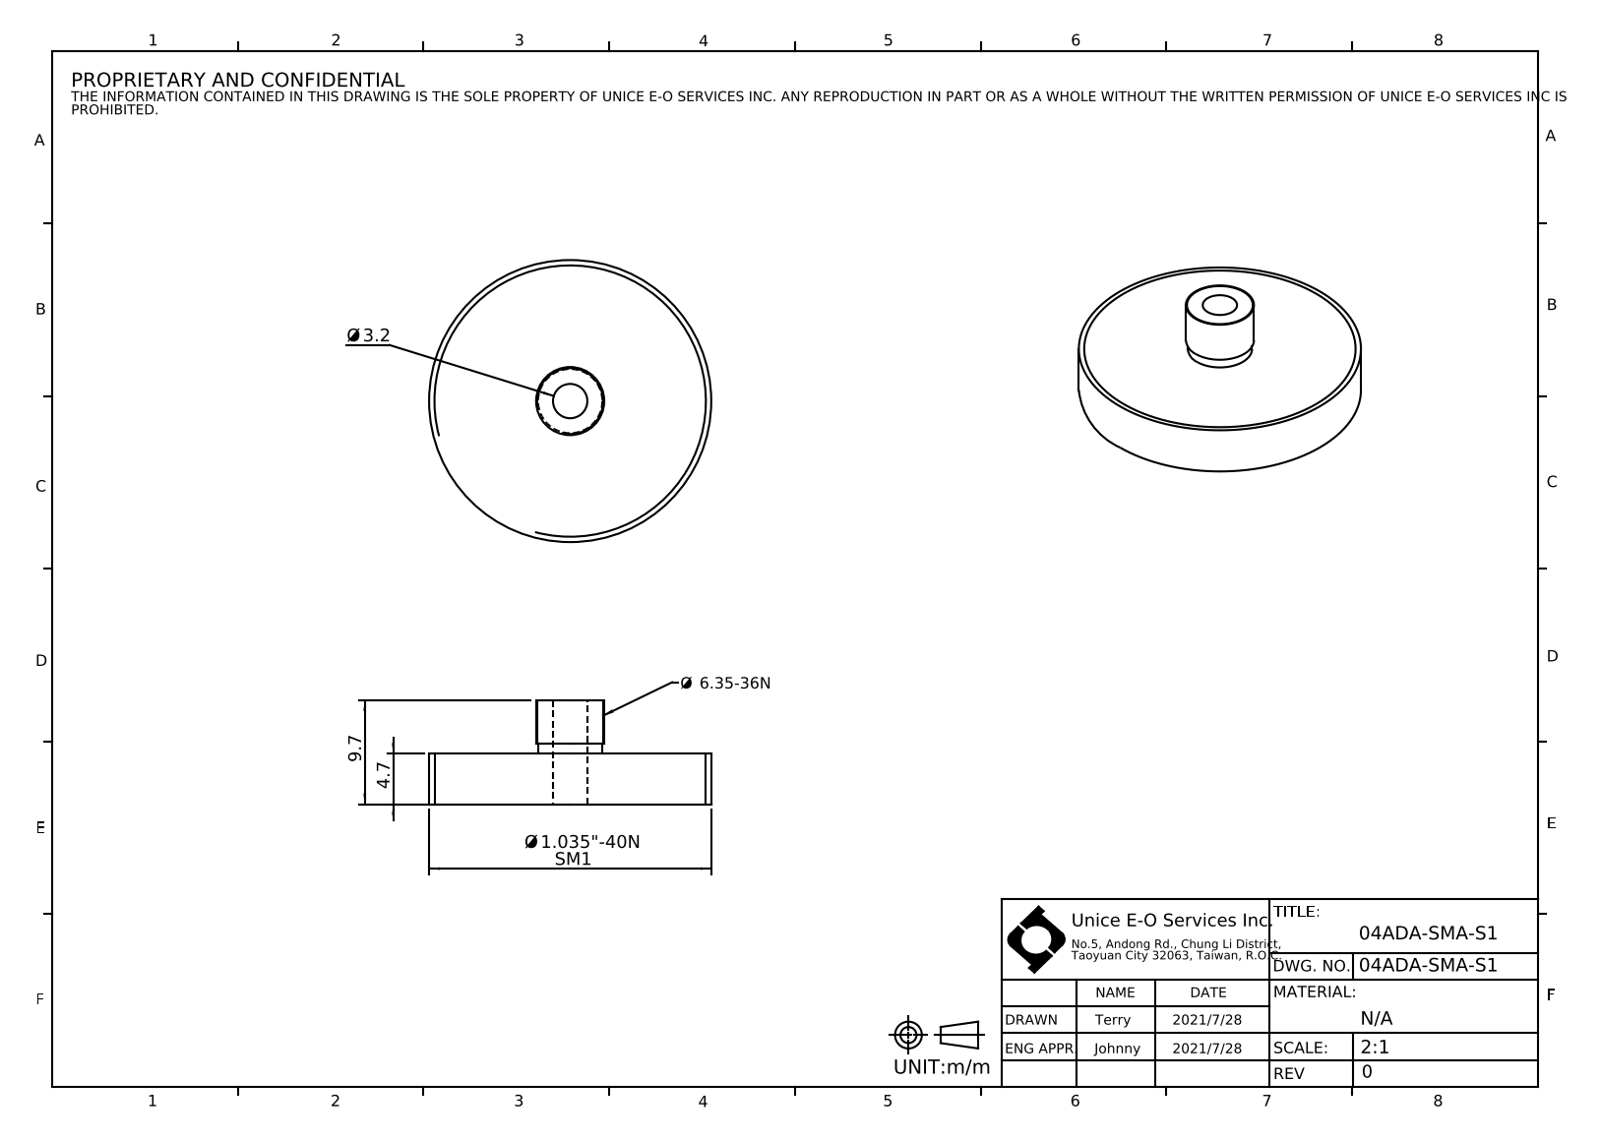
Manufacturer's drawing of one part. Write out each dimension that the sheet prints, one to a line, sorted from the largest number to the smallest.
9.7
4.7
Ø 3.2
Ø 1.035"-40N SM1
